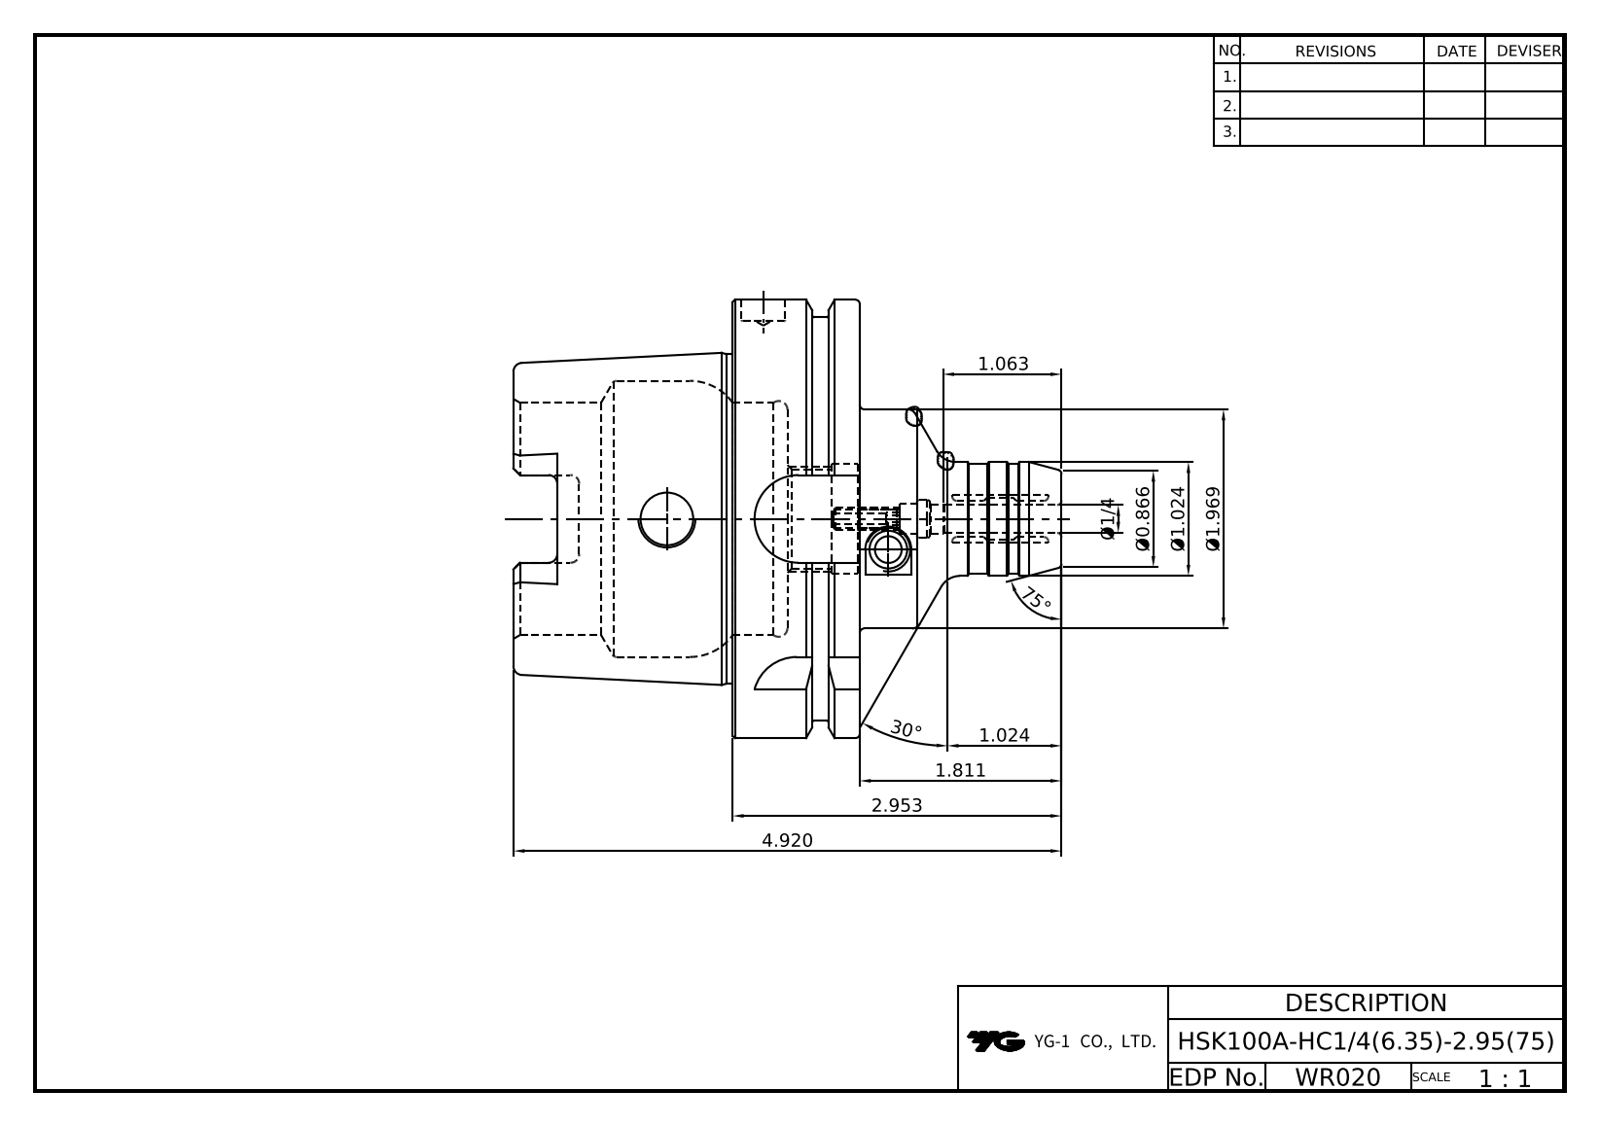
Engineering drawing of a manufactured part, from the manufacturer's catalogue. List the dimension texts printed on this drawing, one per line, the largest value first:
75°
30°
4.920
2.953
Ø1.969
1.811
1.063
1.024
Ø1.024
Ø0.866
Ø1/4
